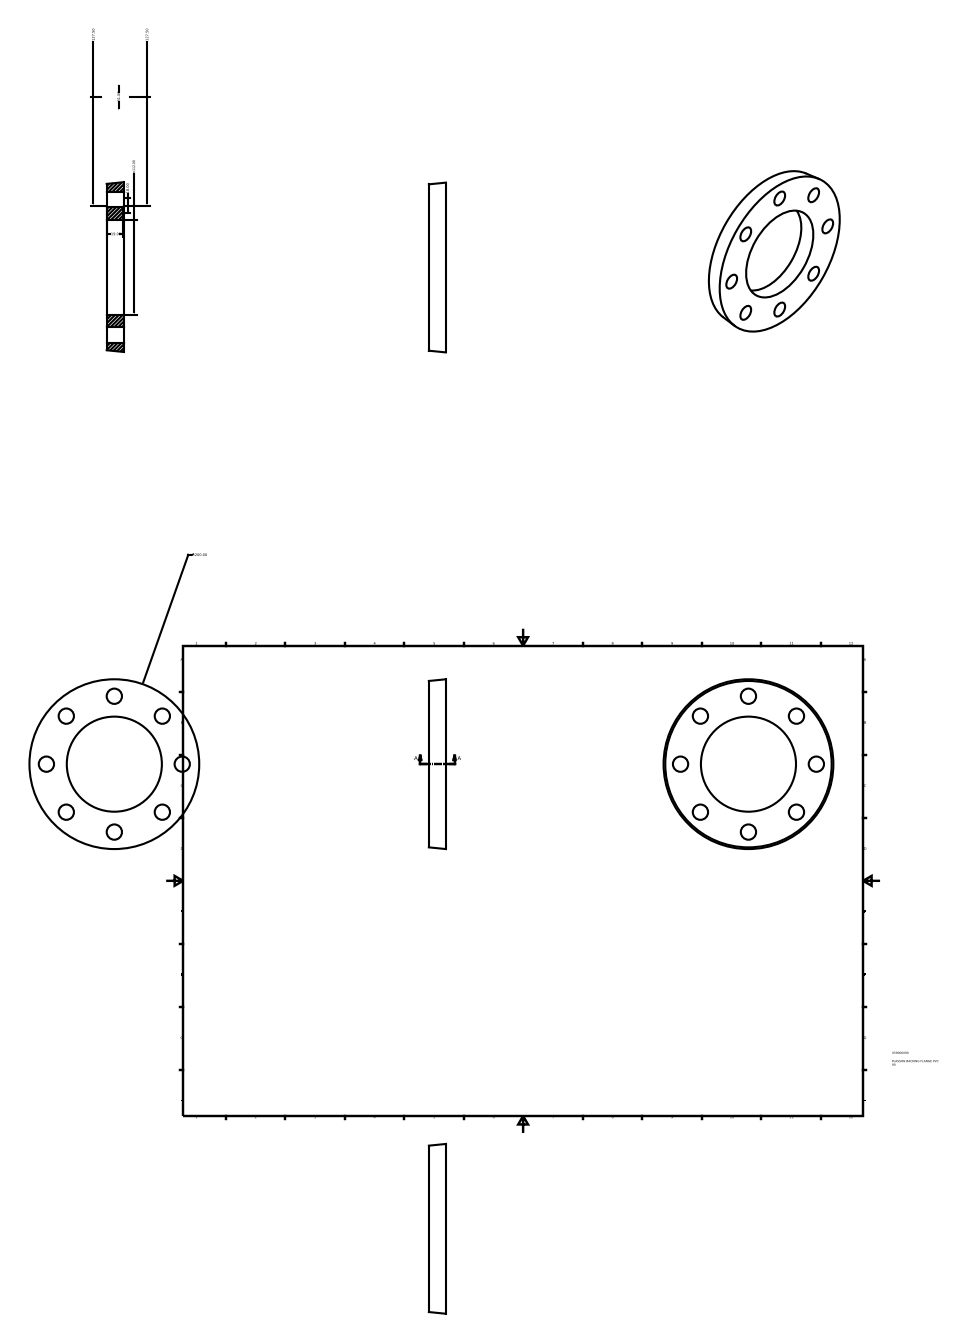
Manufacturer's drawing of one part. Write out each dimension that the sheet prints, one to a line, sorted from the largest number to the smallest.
∅200.00
127.50
127.50
n112.00
31.00
19.00
18.00
